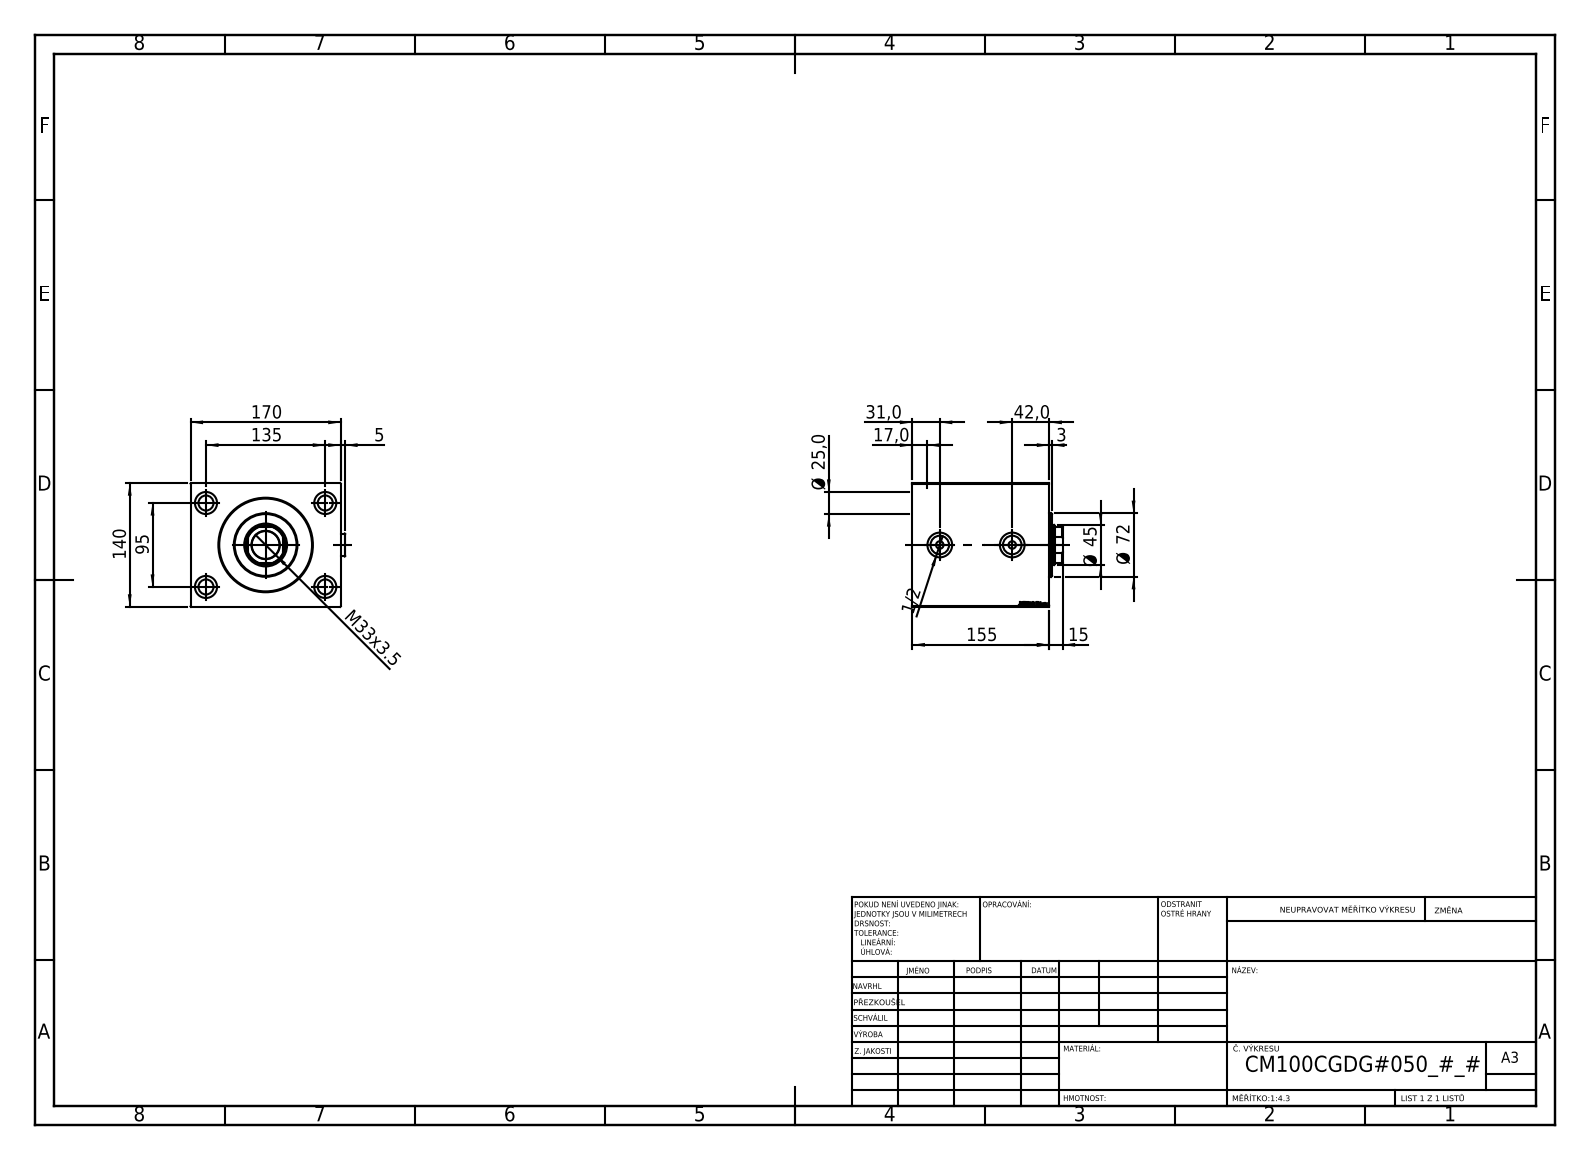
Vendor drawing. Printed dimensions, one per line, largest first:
170
155
140
135
95
Ø 72
Ø 45
42,0
M33x3.5
31,0
Ø 25,0
17,0
15
5
3
1/2
